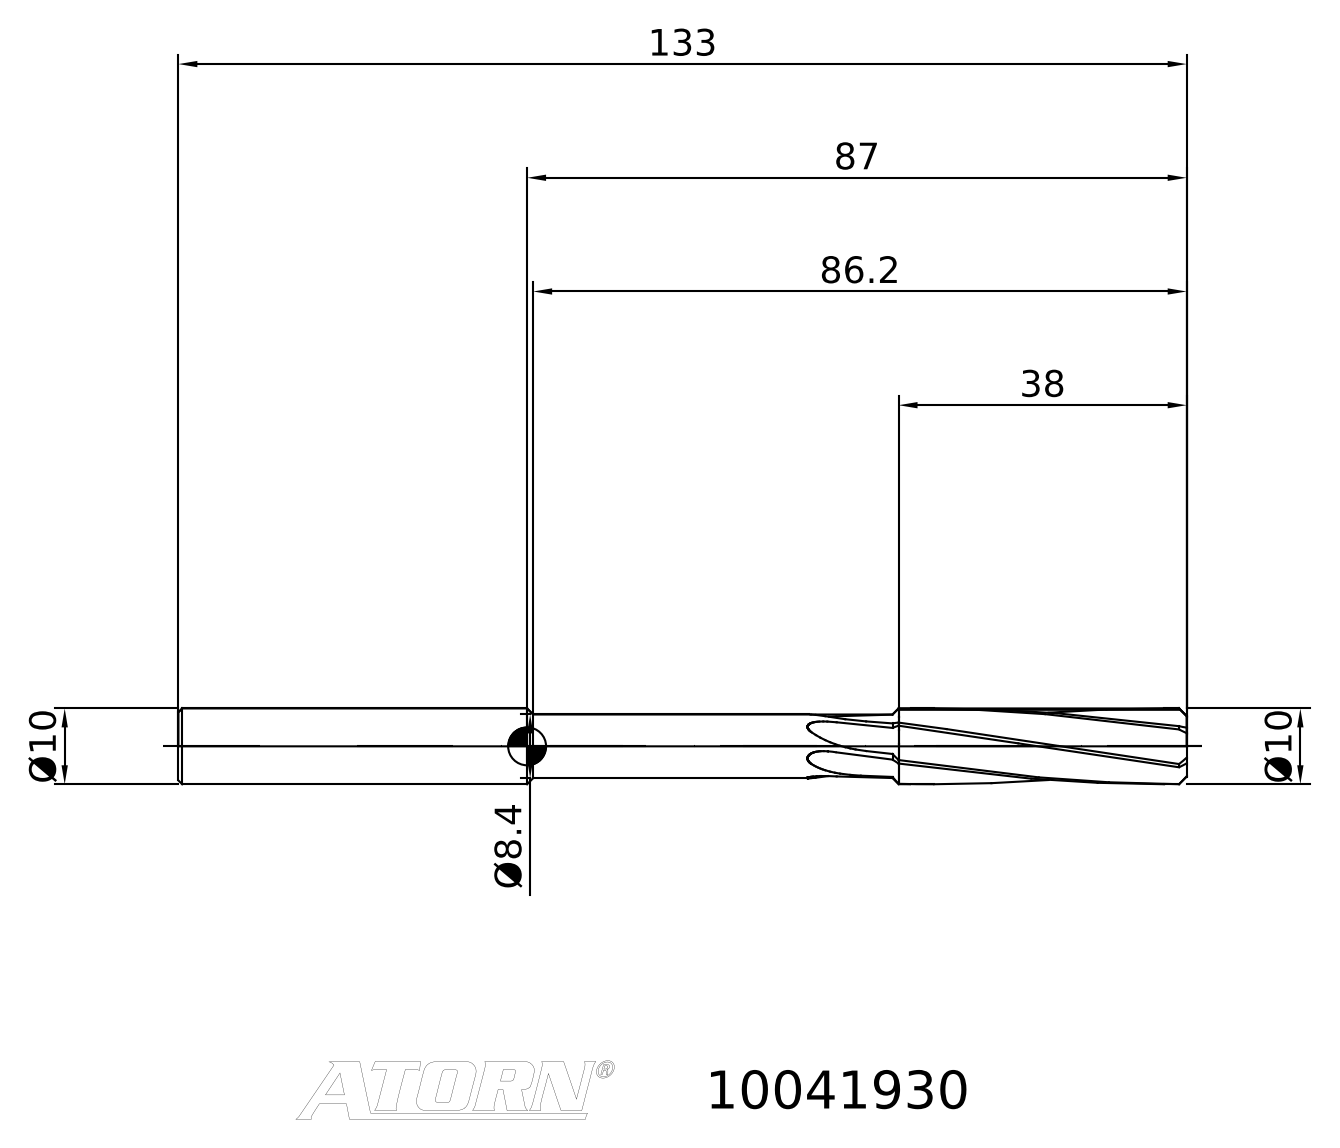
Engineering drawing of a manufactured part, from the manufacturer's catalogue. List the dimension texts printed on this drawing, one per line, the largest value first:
133
87
86.2
38
Ø10
Ø10
Ø8.4
